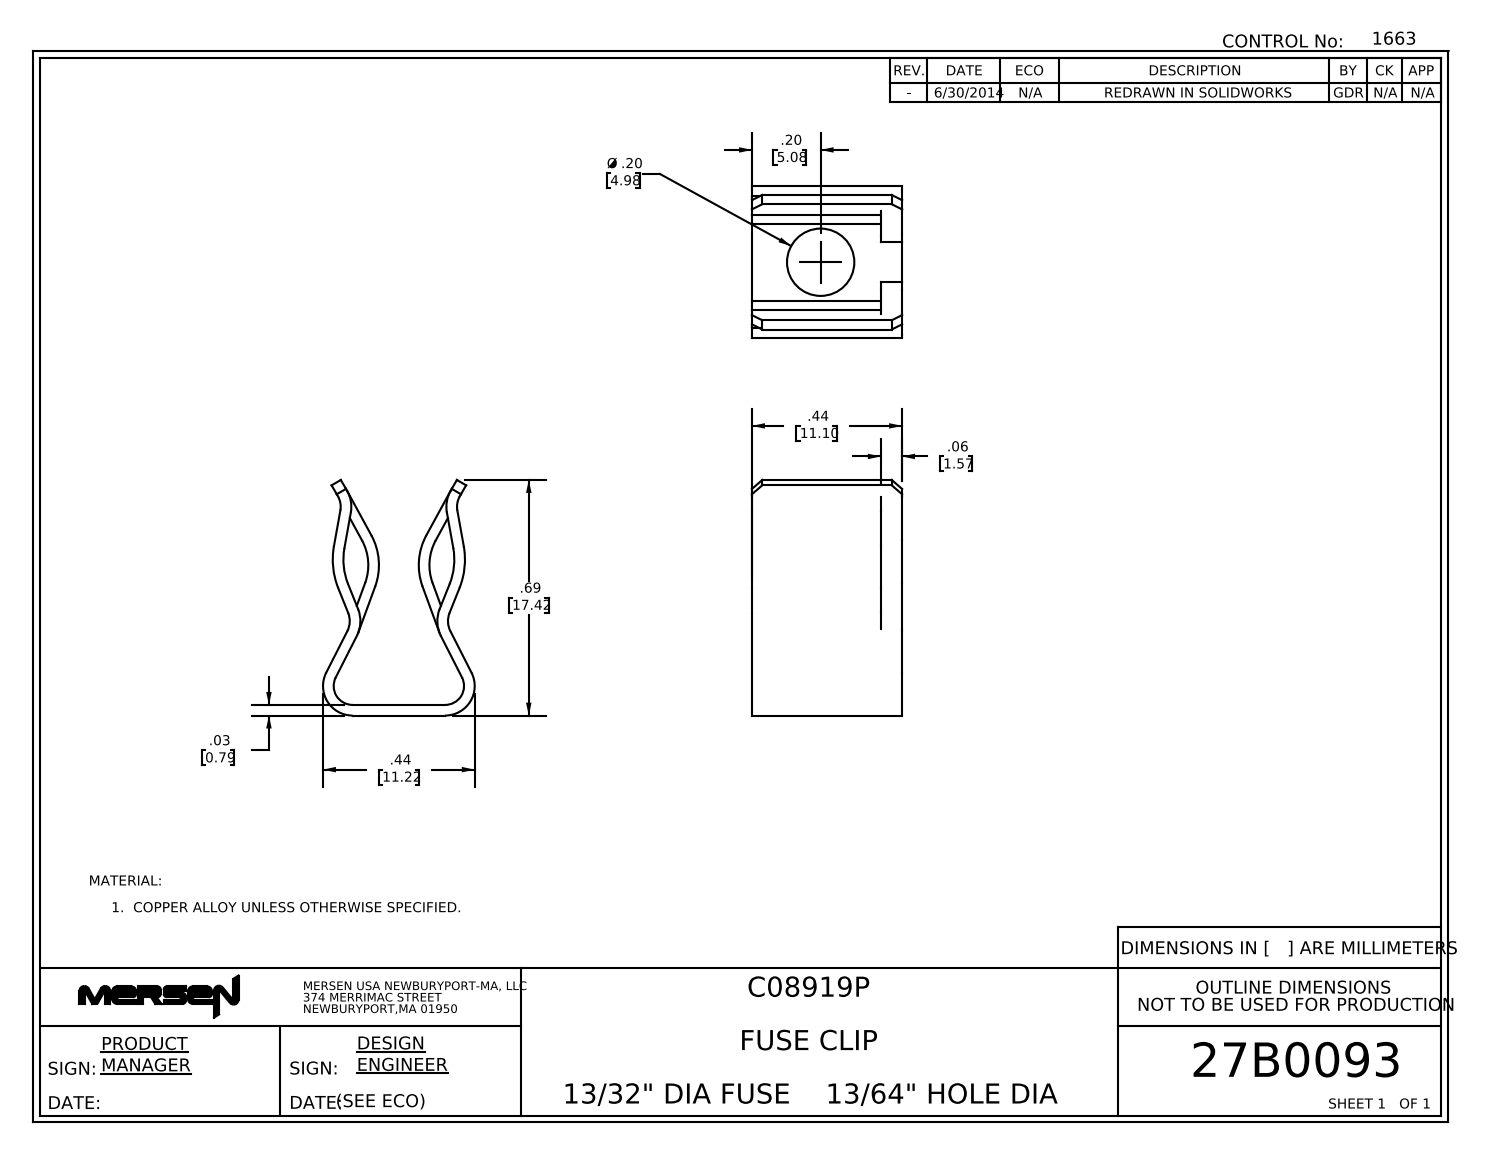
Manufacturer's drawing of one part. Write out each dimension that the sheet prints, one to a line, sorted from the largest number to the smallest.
.69 17.42
.44 11.22
.44 11.10
Ø .20 4.98
.20 5.08
.06 1.57
.03 0.79
